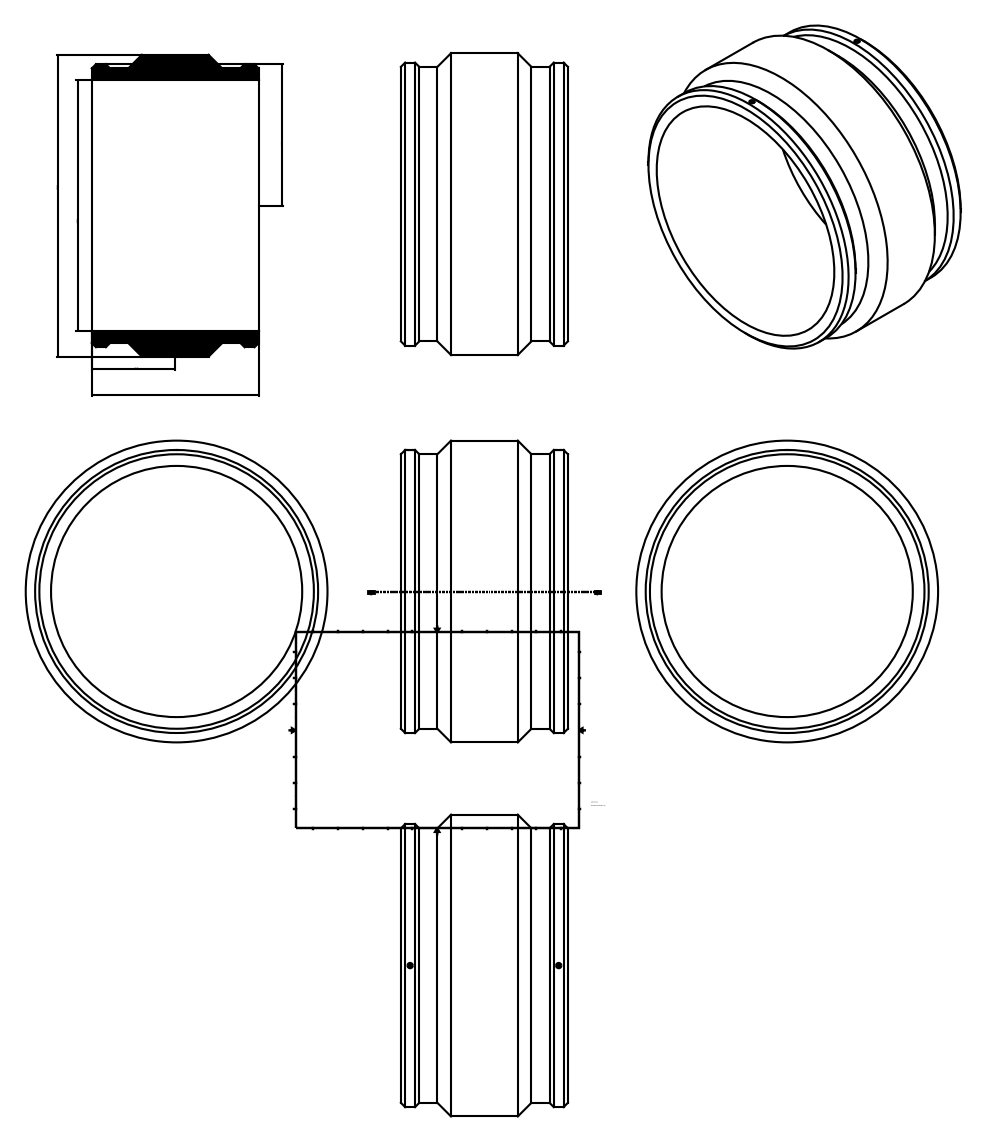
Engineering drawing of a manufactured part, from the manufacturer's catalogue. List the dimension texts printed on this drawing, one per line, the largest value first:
853,00
710,00
472,00
400,00
236,00
